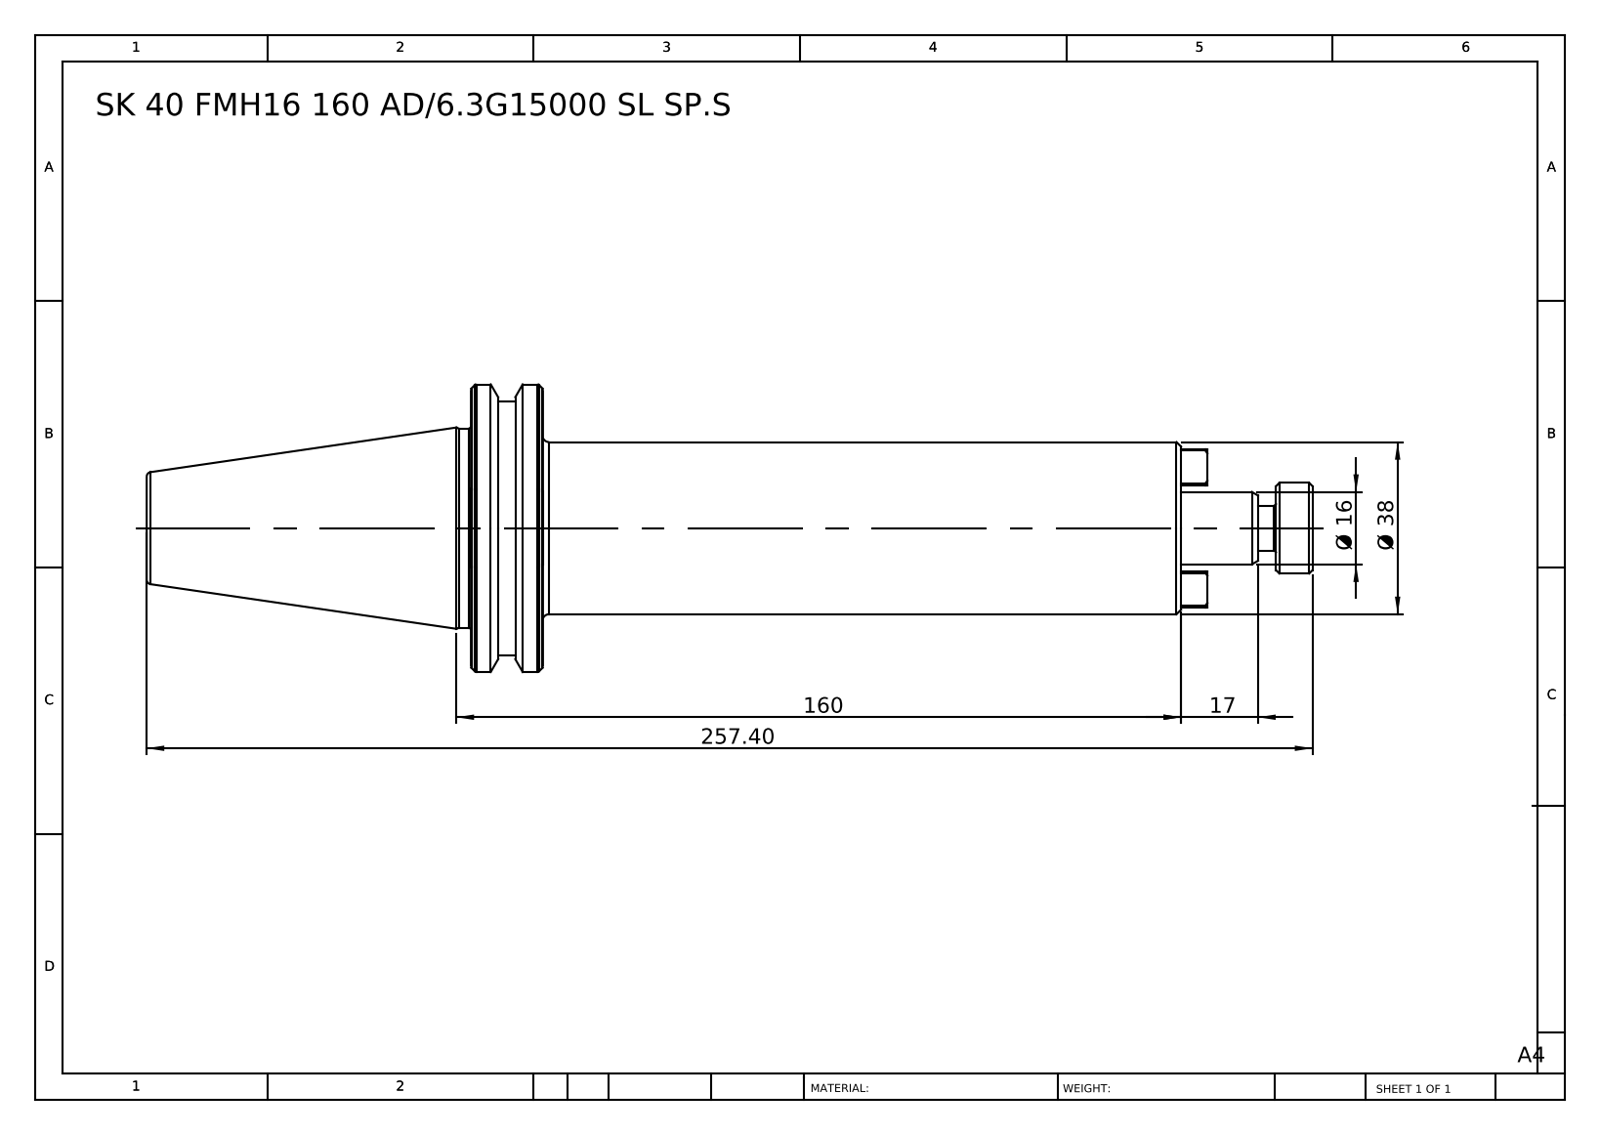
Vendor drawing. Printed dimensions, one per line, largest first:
257.40
160
Ø 38
17
Ø 16
